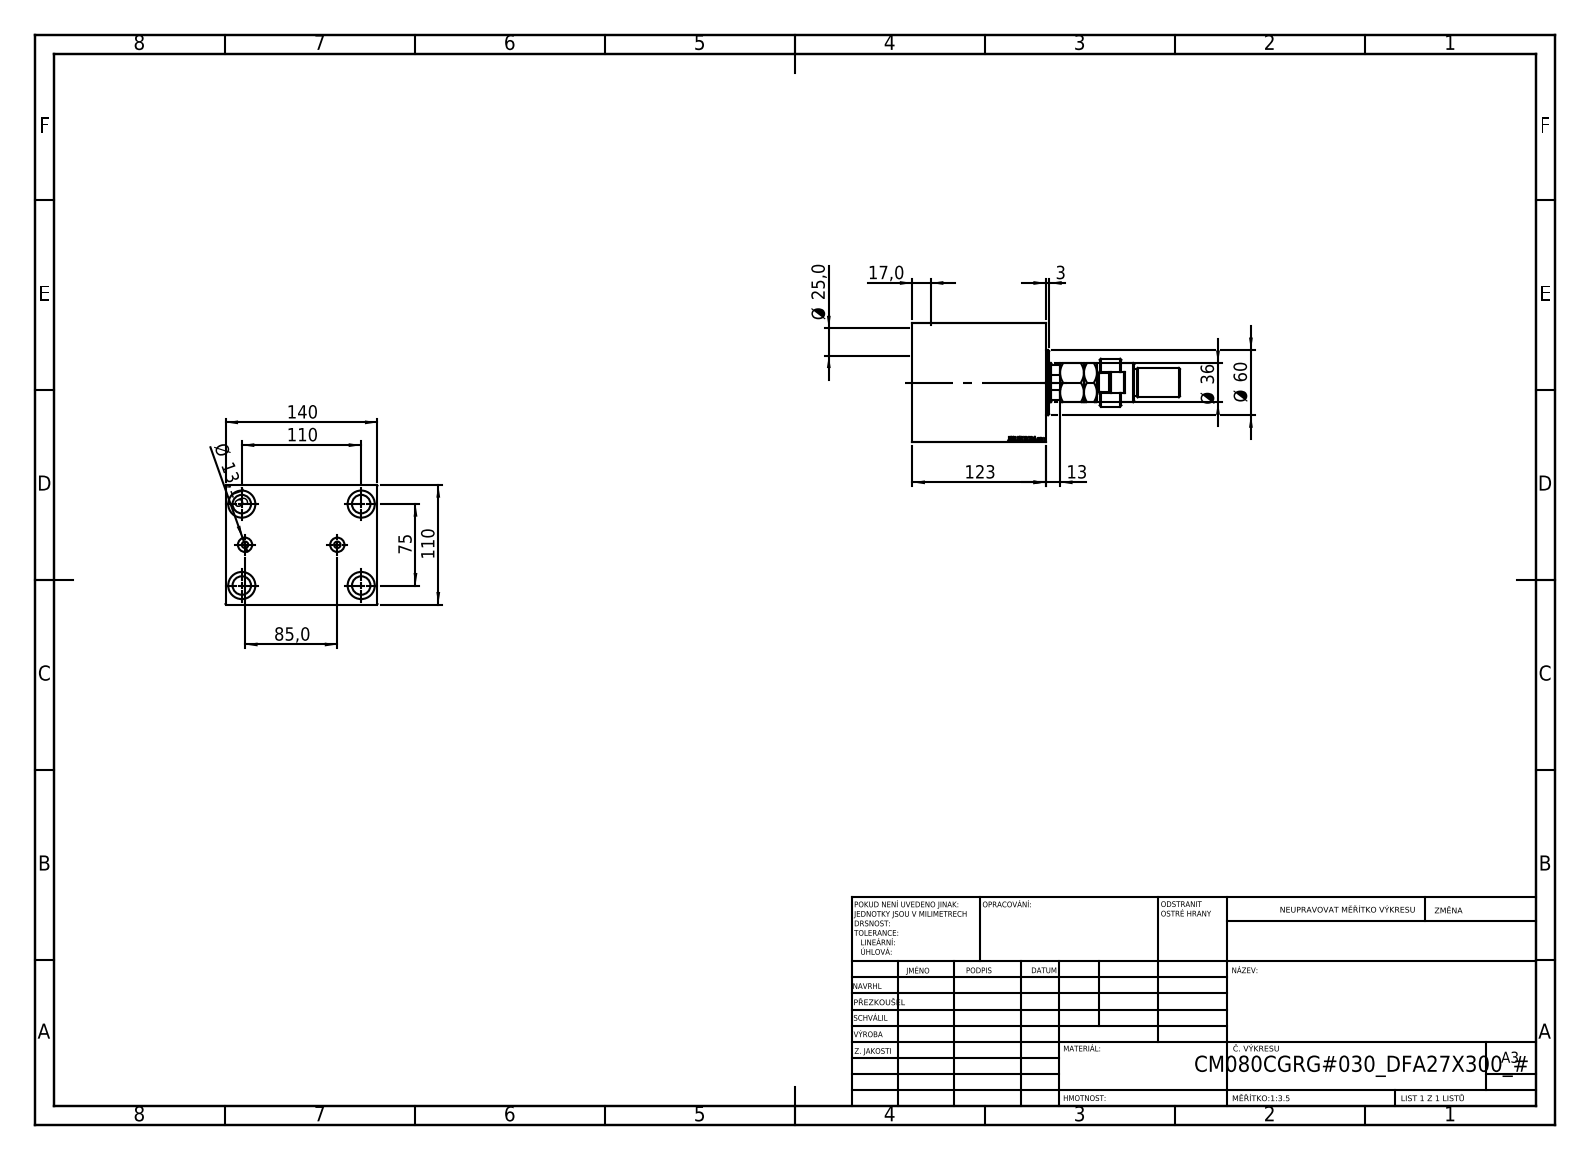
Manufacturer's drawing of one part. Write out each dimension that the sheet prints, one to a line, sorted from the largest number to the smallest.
140
123
110
110
85,0
75
Ø 60
Ø 36
Ø 25,0
17,0
Ø 13,16
13
3
